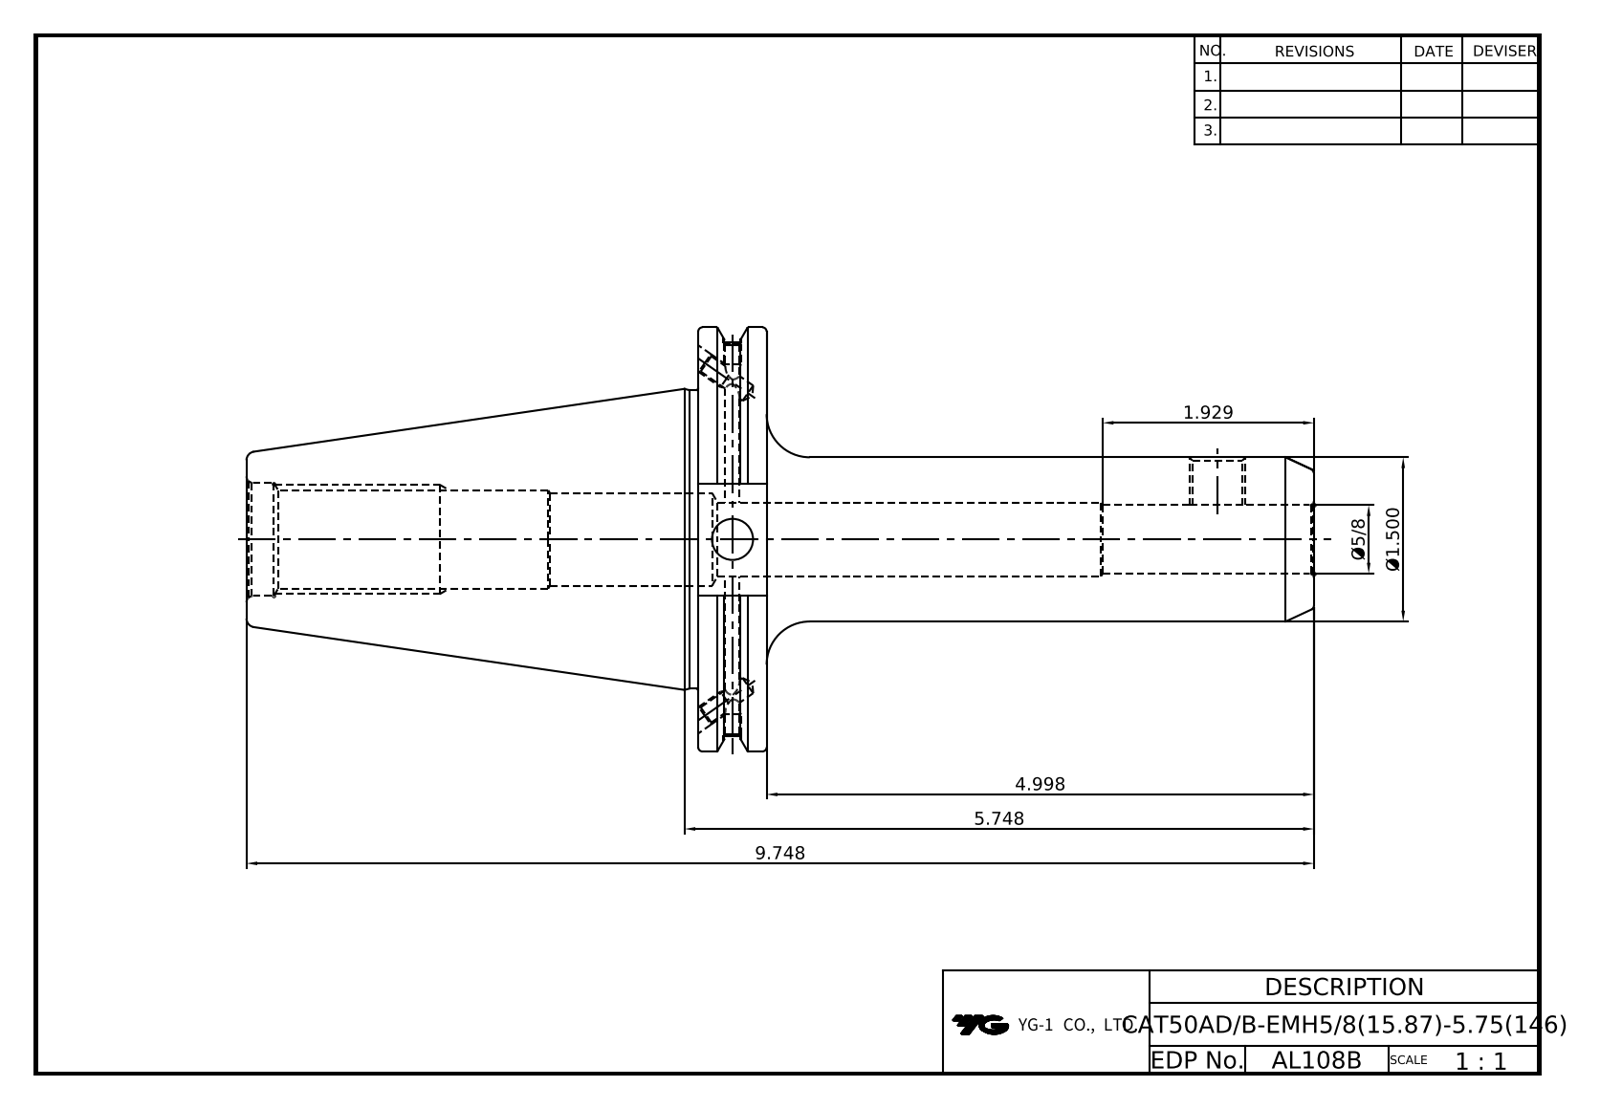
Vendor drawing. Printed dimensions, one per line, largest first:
9.748
5.748
4.998
1.929
Ø1.500
Ø5/8
